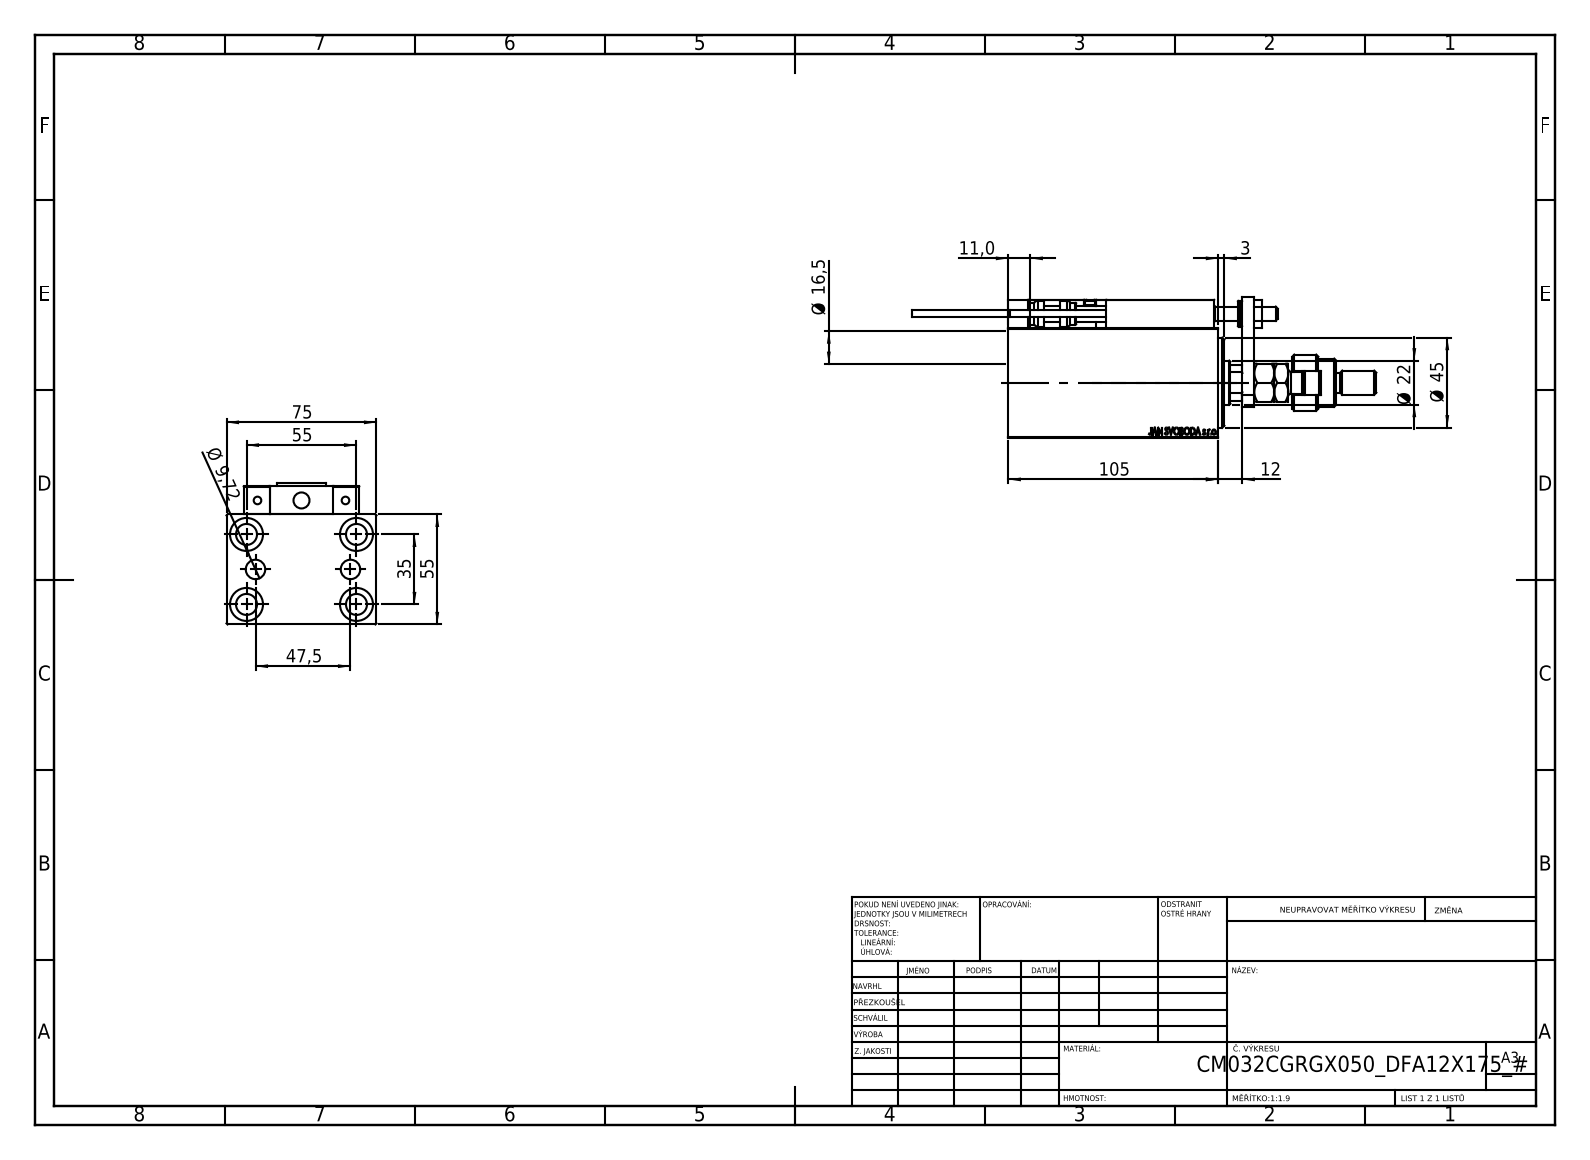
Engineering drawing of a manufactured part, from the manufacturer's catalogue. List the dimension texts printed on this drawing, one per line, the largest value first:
105
75
55
55
47,5
Ø 45
35
Ø 22
Ø 16,5
12
11,0
Ø 9,72
3
